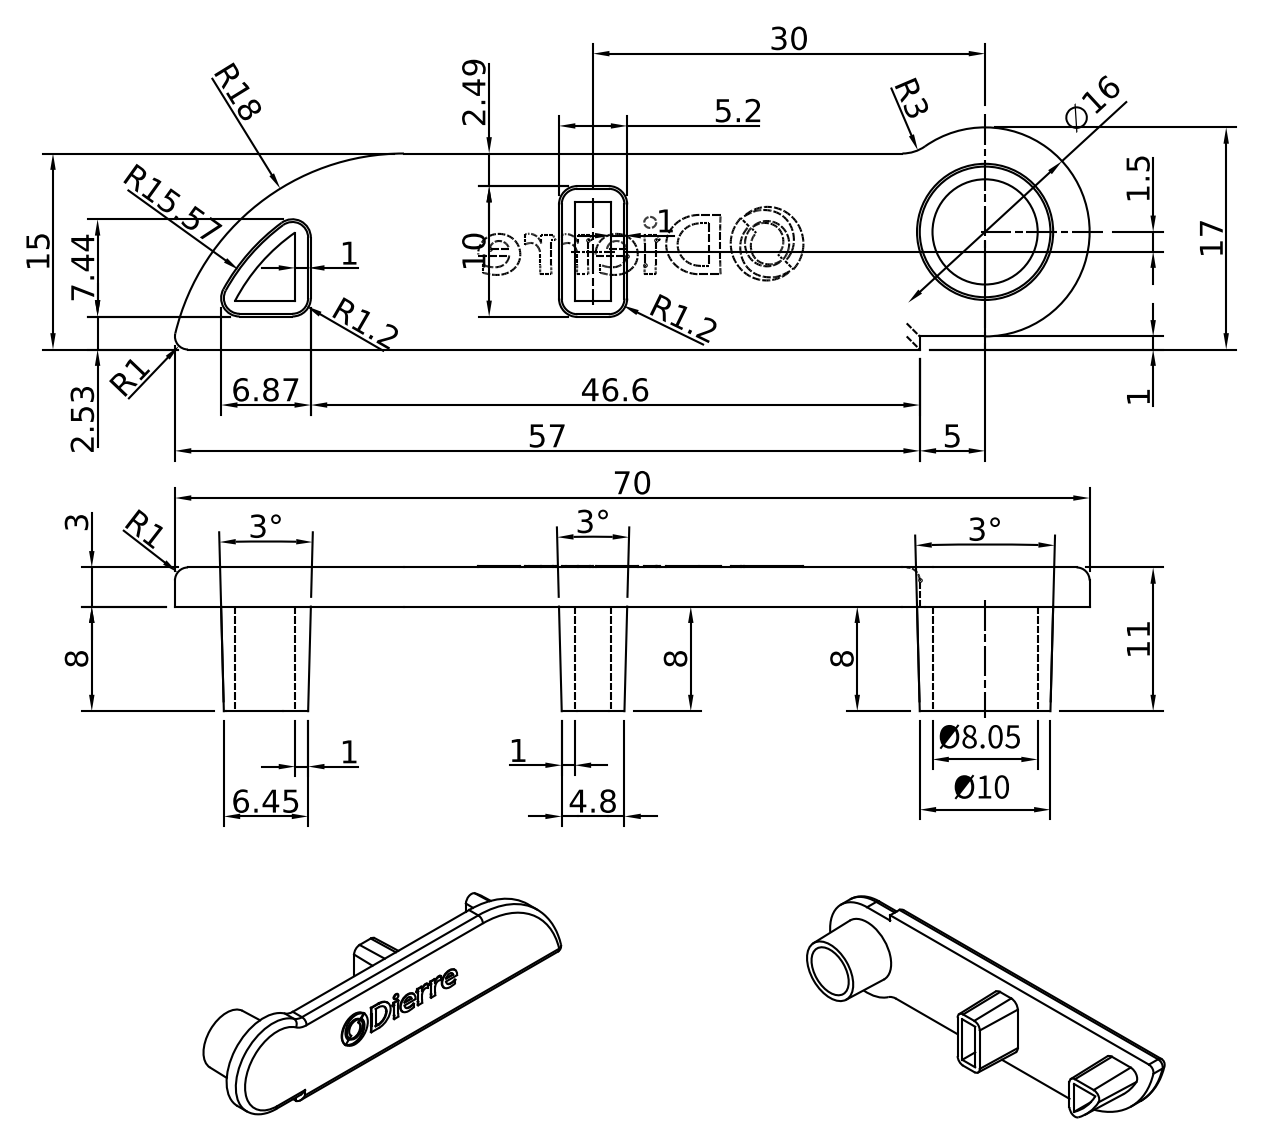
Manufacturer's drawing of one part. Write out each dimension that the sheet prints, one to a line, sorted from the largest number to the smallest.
70
57
46.6
30
R18
17
∅16
R15.57
15
11
10
Ø10
Ø8.05
8
8
8
7.44
6.87
6.45
5.2
5
4.8
3
R3
3°
3°
3°
2.53
2.49
1.5
R1.2
R1.2
R1
1
1
1
R1
1
1
